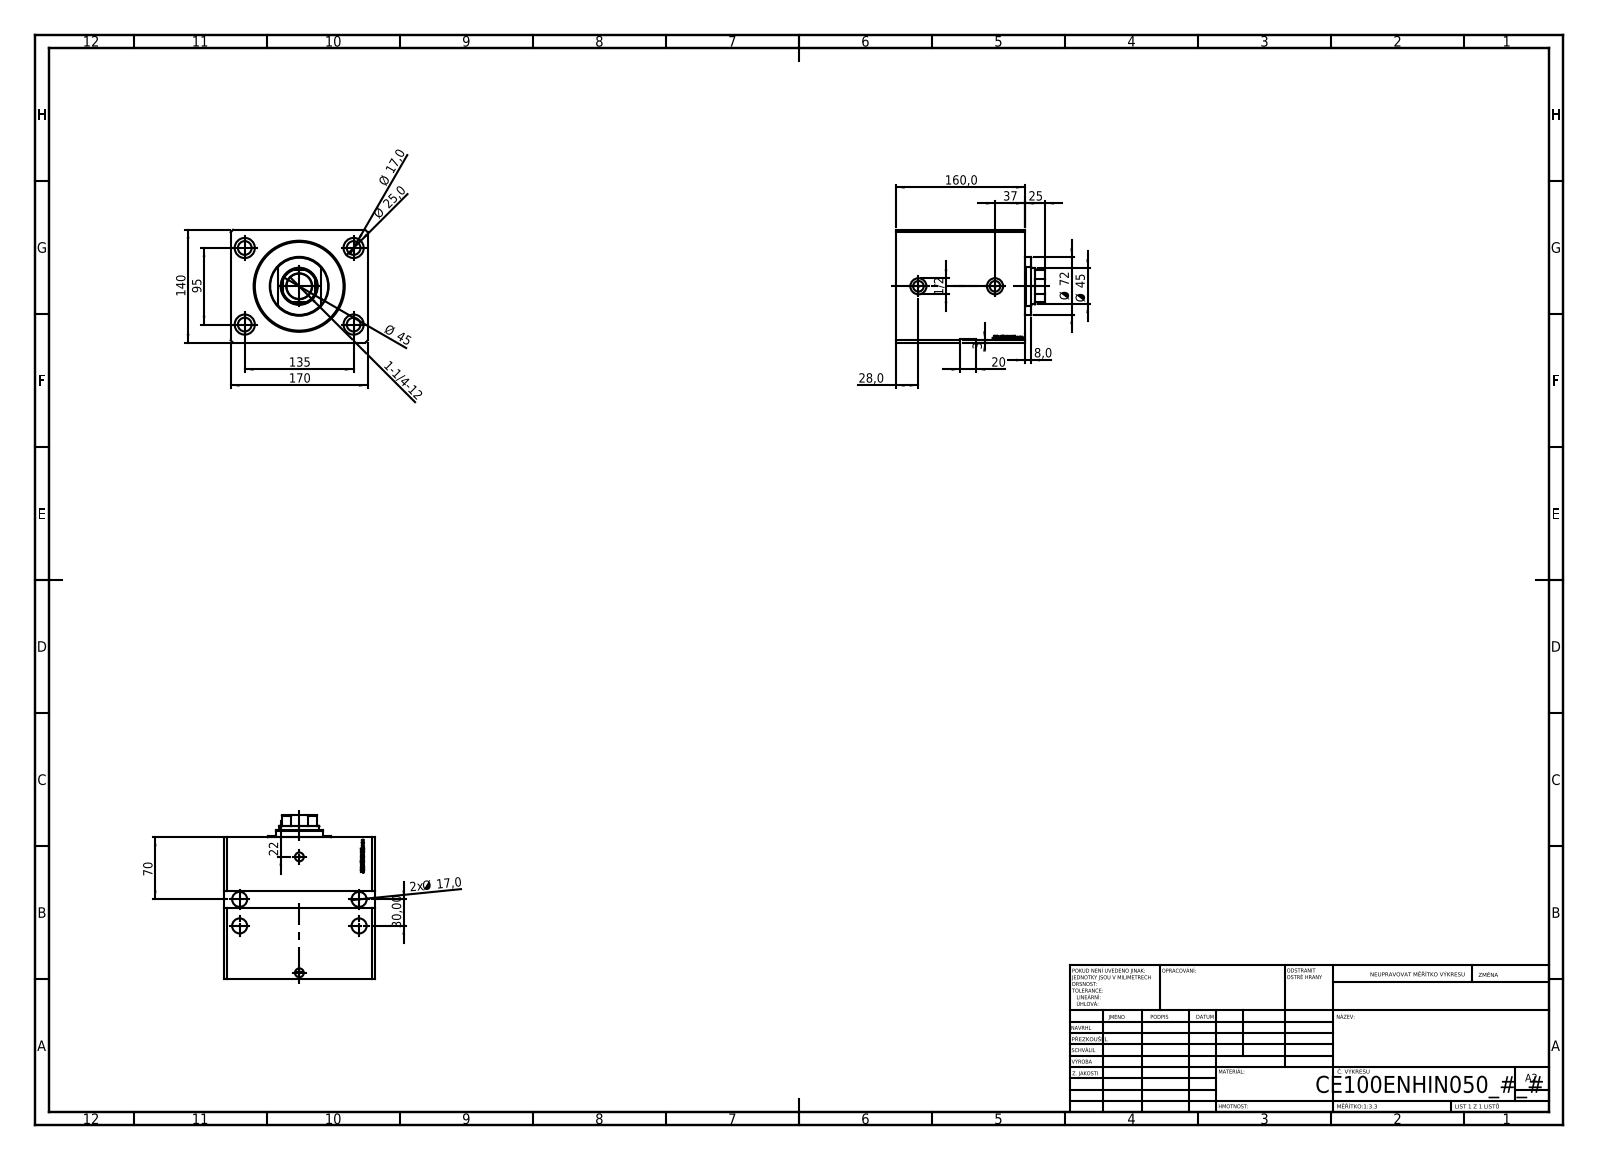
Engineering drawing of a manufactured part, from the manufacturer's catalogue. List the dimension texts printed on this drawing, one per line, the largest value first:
170
160,0
140
135
95
Ø 72
70
Ø 45
Ø 45
37
30,00
28,0
Ø 25,0
25
22
20
Ø 17,0
2x Ø 17,0
8,0
3
1-1/4-12
1/2
